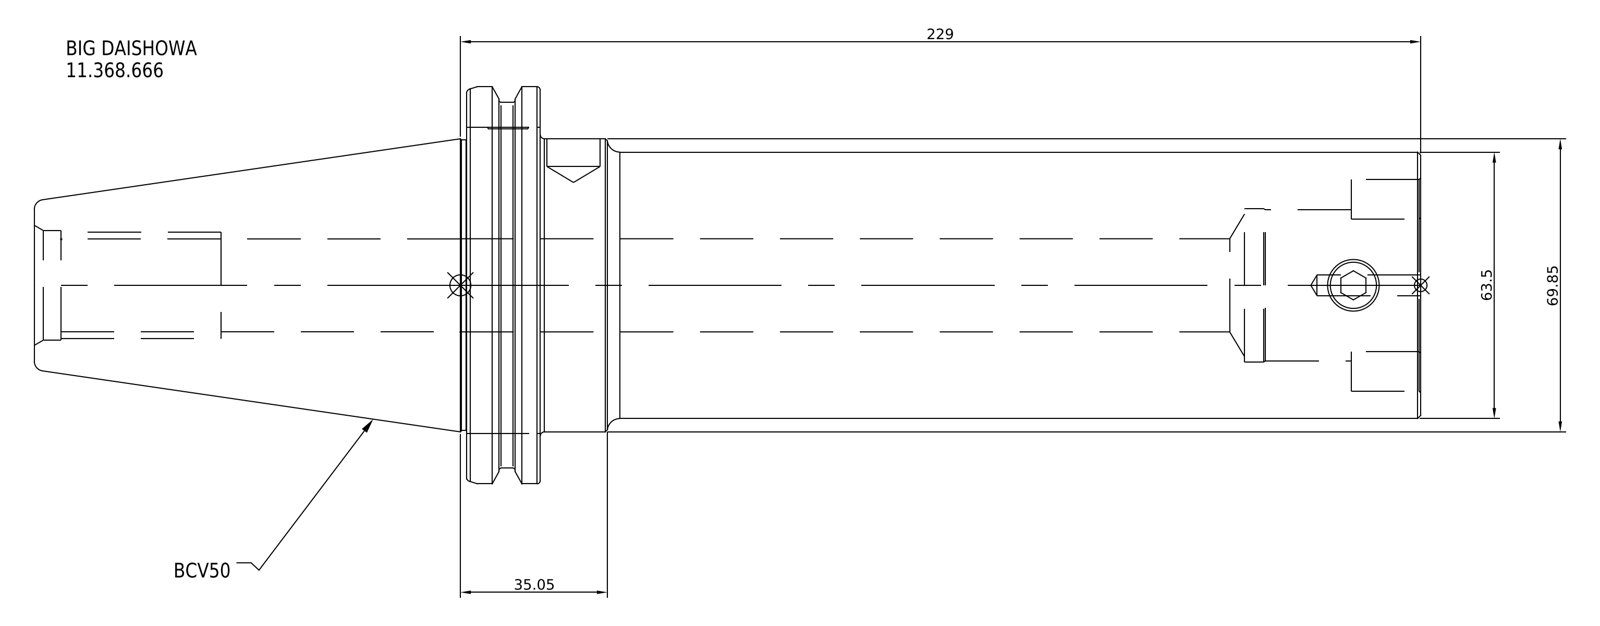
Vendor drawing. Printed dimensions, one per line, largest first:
229
69.85
63.5
35.05
